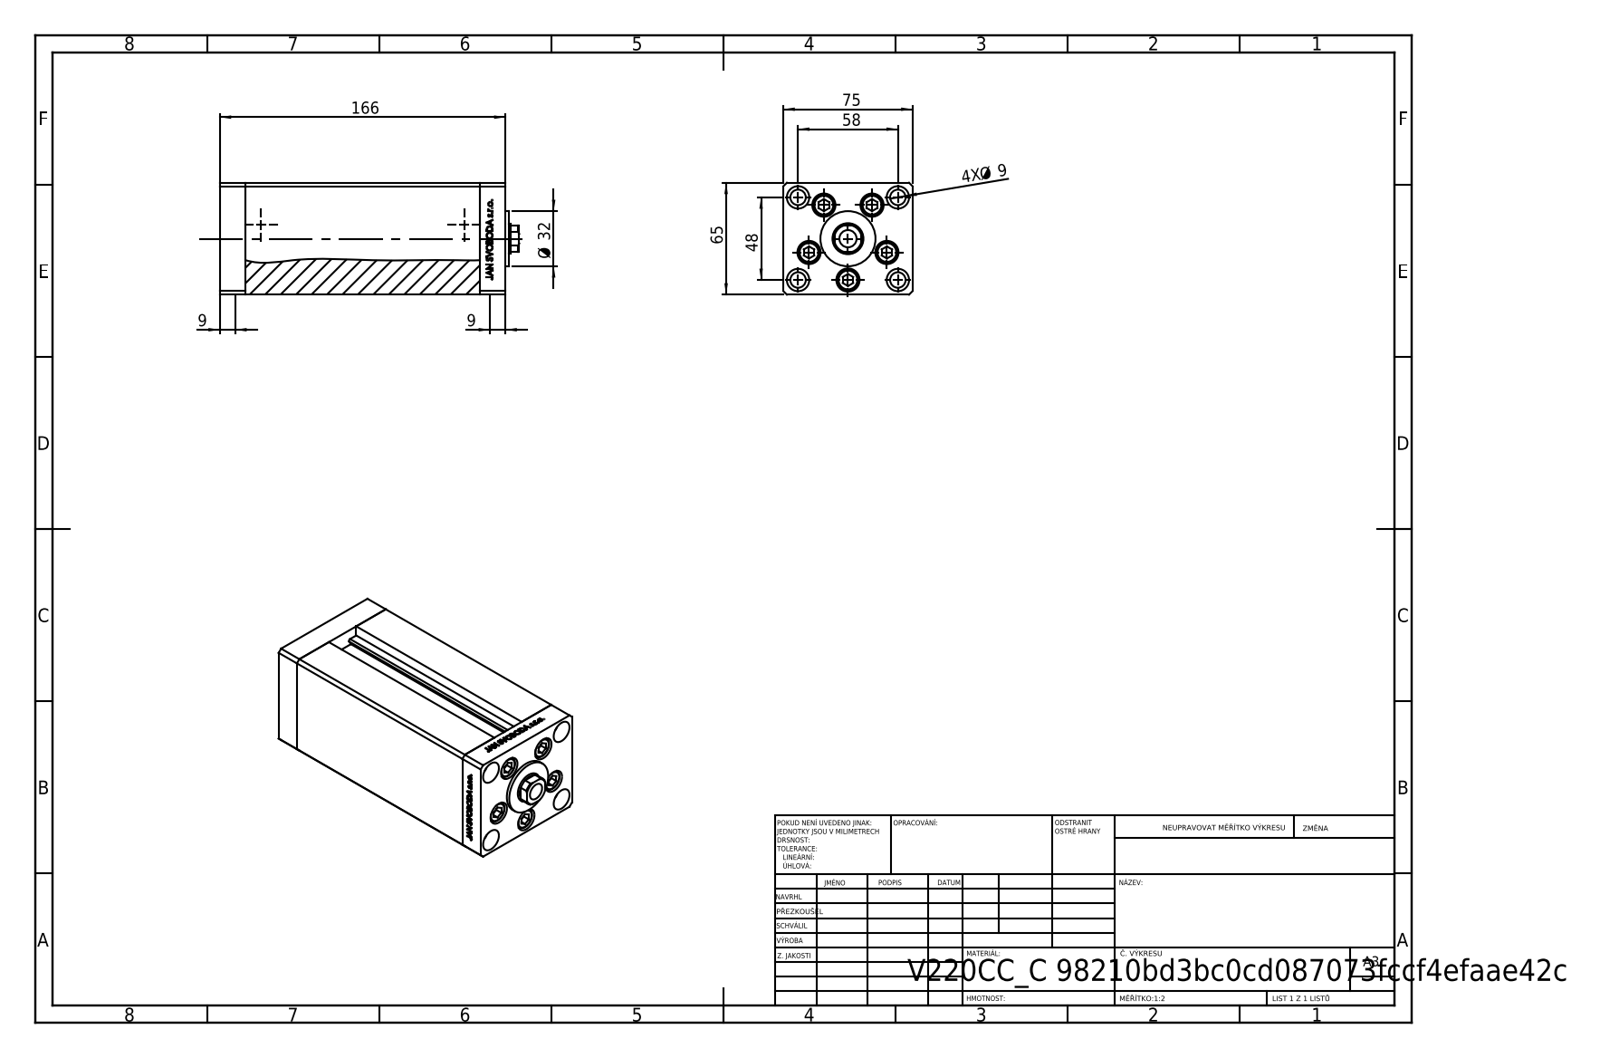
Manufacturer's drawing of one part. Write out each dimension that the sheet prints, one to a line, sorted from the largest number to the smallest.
166
75
65
58
48
Ø 32
9
9
4X Ø 9
